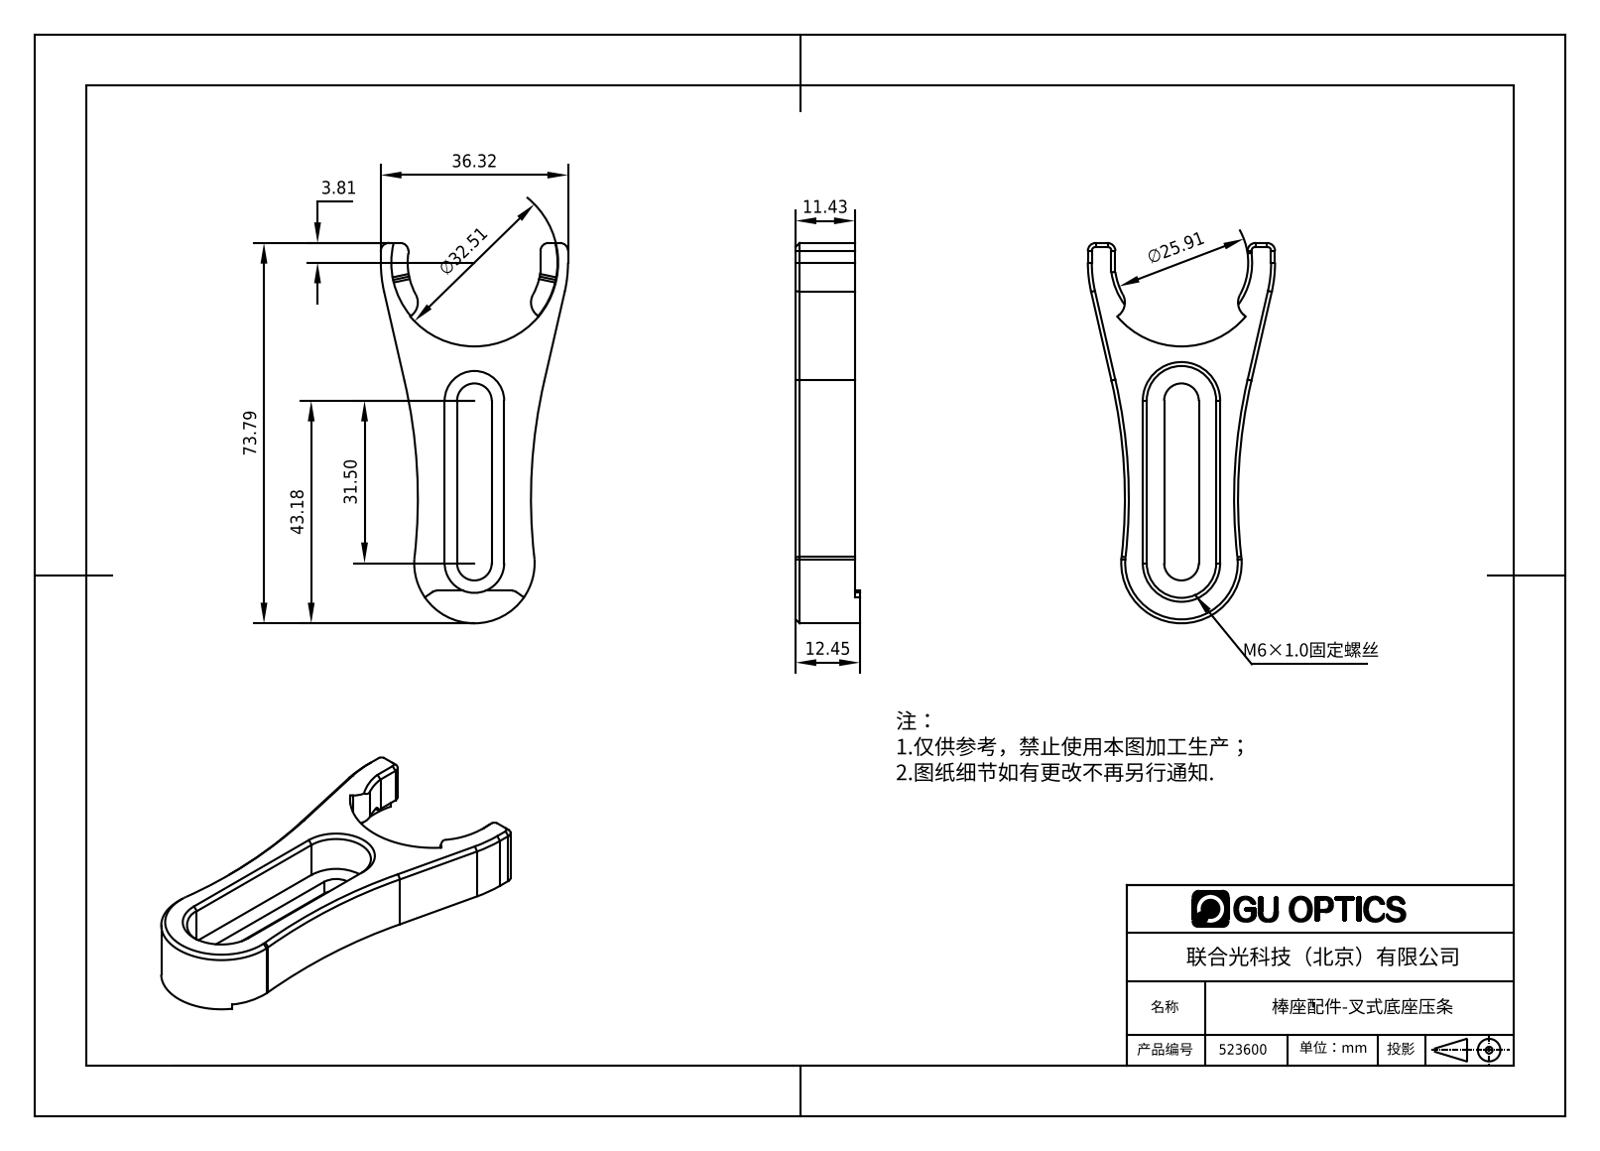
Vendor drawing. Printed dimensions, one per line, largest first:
73.79
43.18
36.32
∅32.51
31.50
∅25.91
12.45
11.43
3.81
